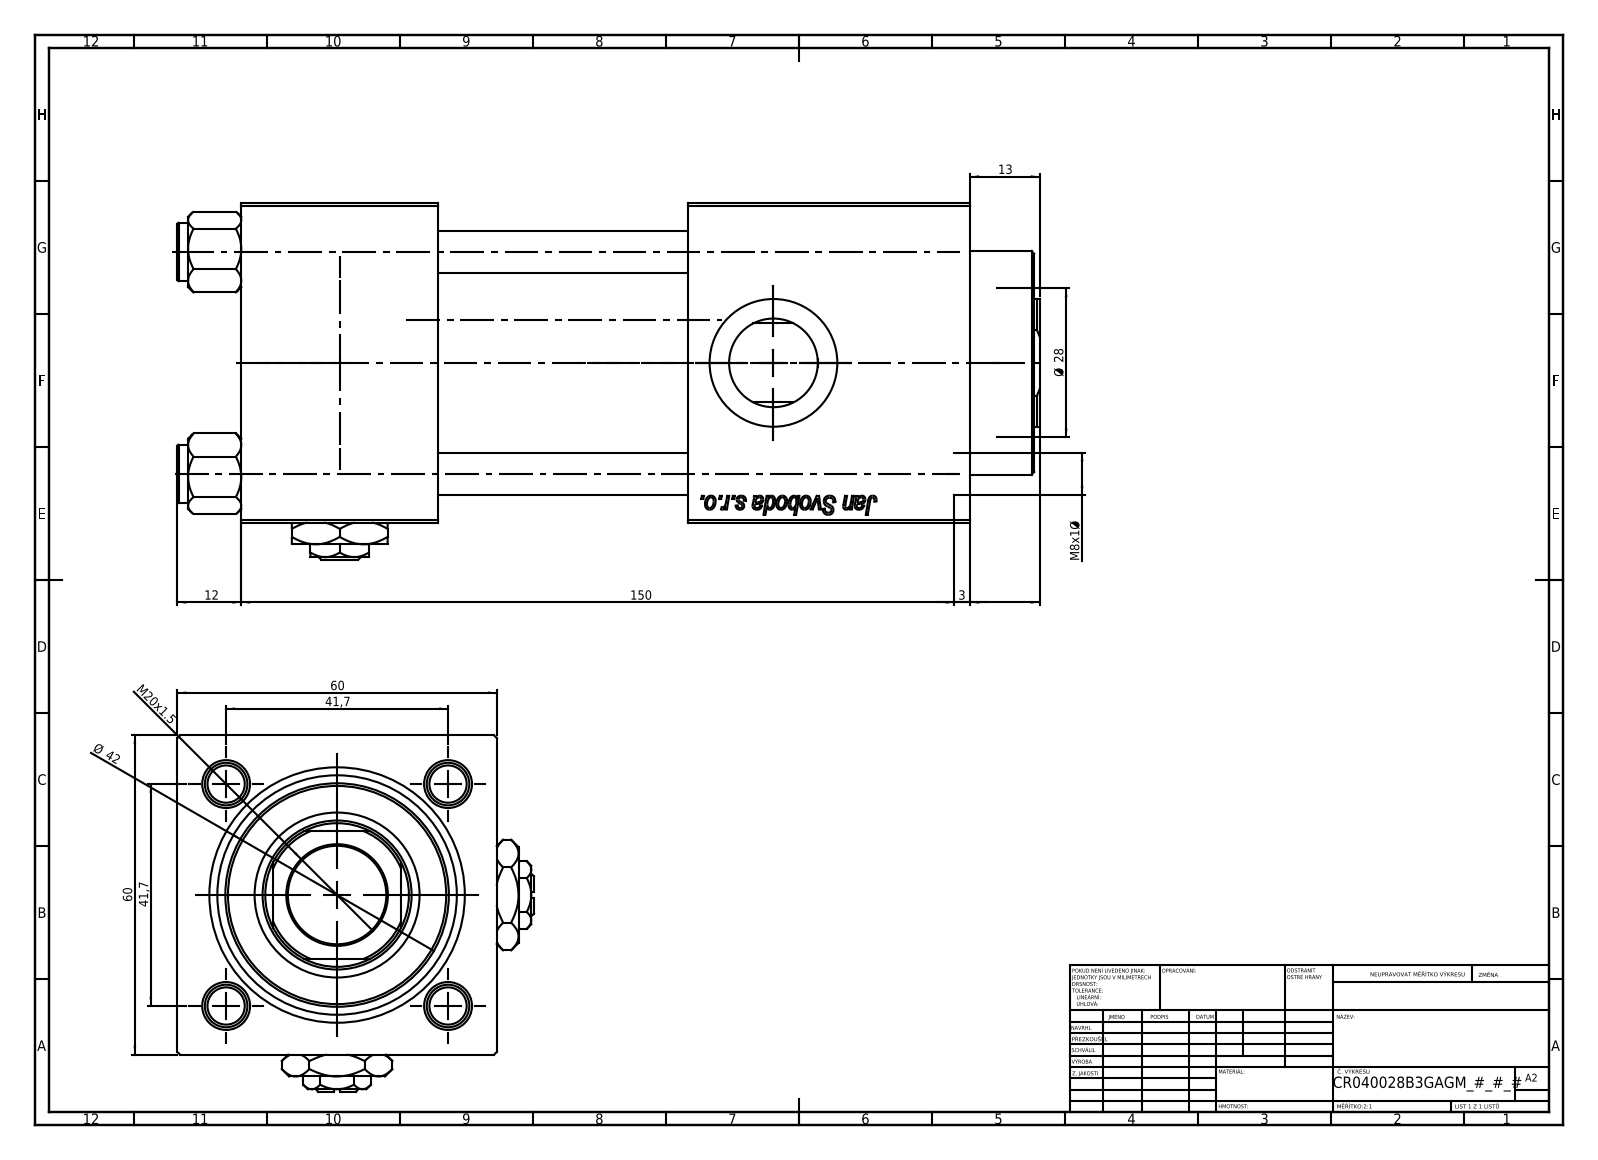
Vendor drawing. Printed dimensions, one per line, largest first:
150
60
60
Ø 42
41,7
41,7
Ø 28
M20x1.5
13
12
M8x1 Ø
3
